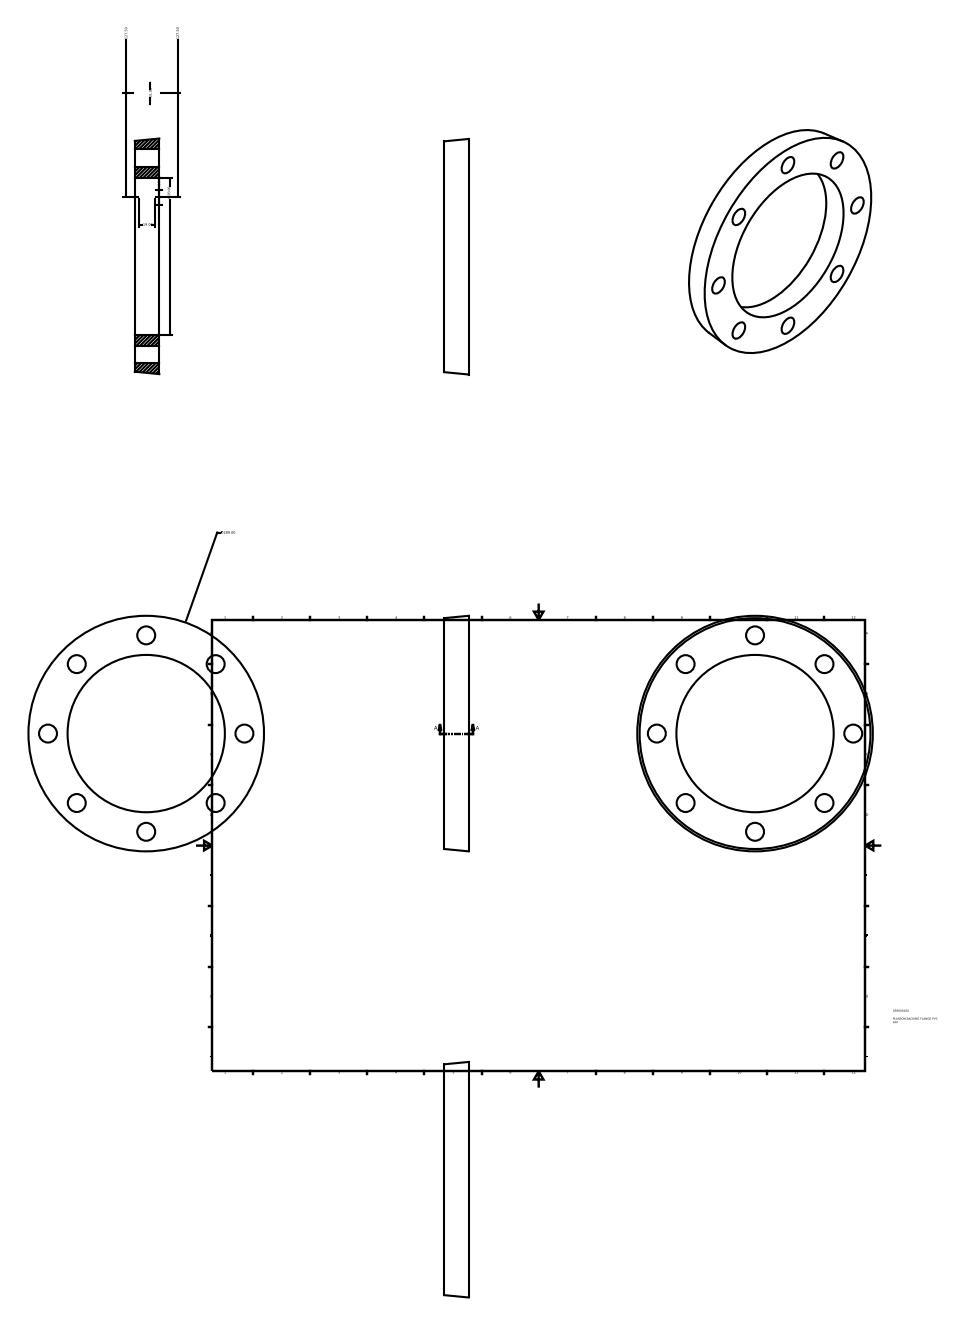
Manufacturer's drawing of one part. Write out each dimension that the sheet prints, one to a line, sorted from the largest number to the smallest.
∅289.00
n193.00
127.50
127.50
31.00
19.00
18.00
